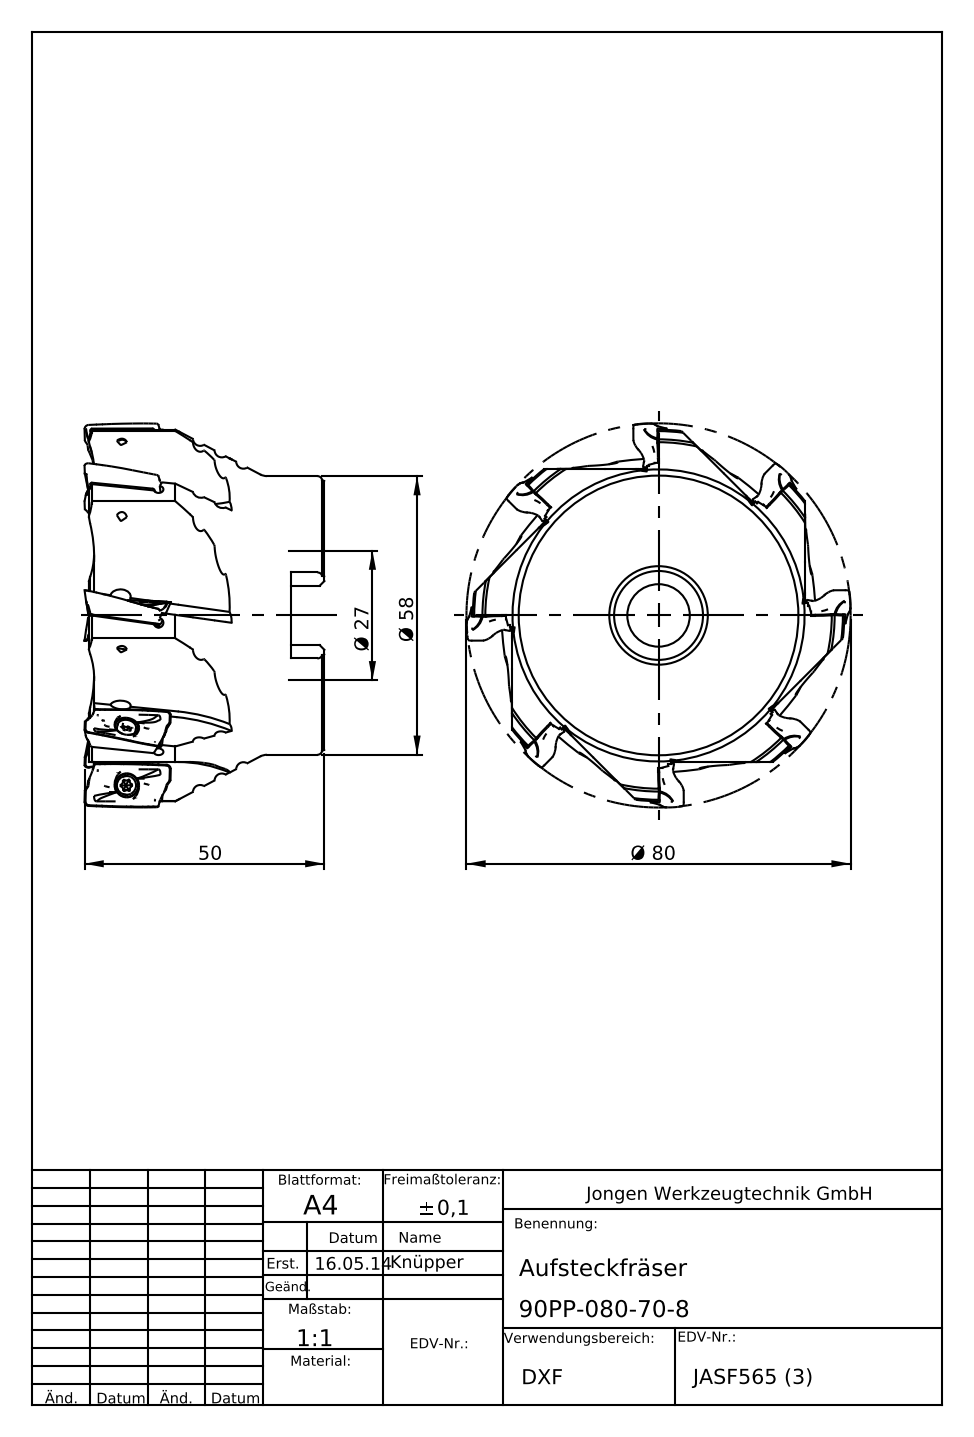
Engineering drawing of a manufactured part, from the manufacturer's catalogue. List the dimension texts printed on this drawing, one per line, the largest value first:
Ø 80
Ø 58
50
Ø 27
